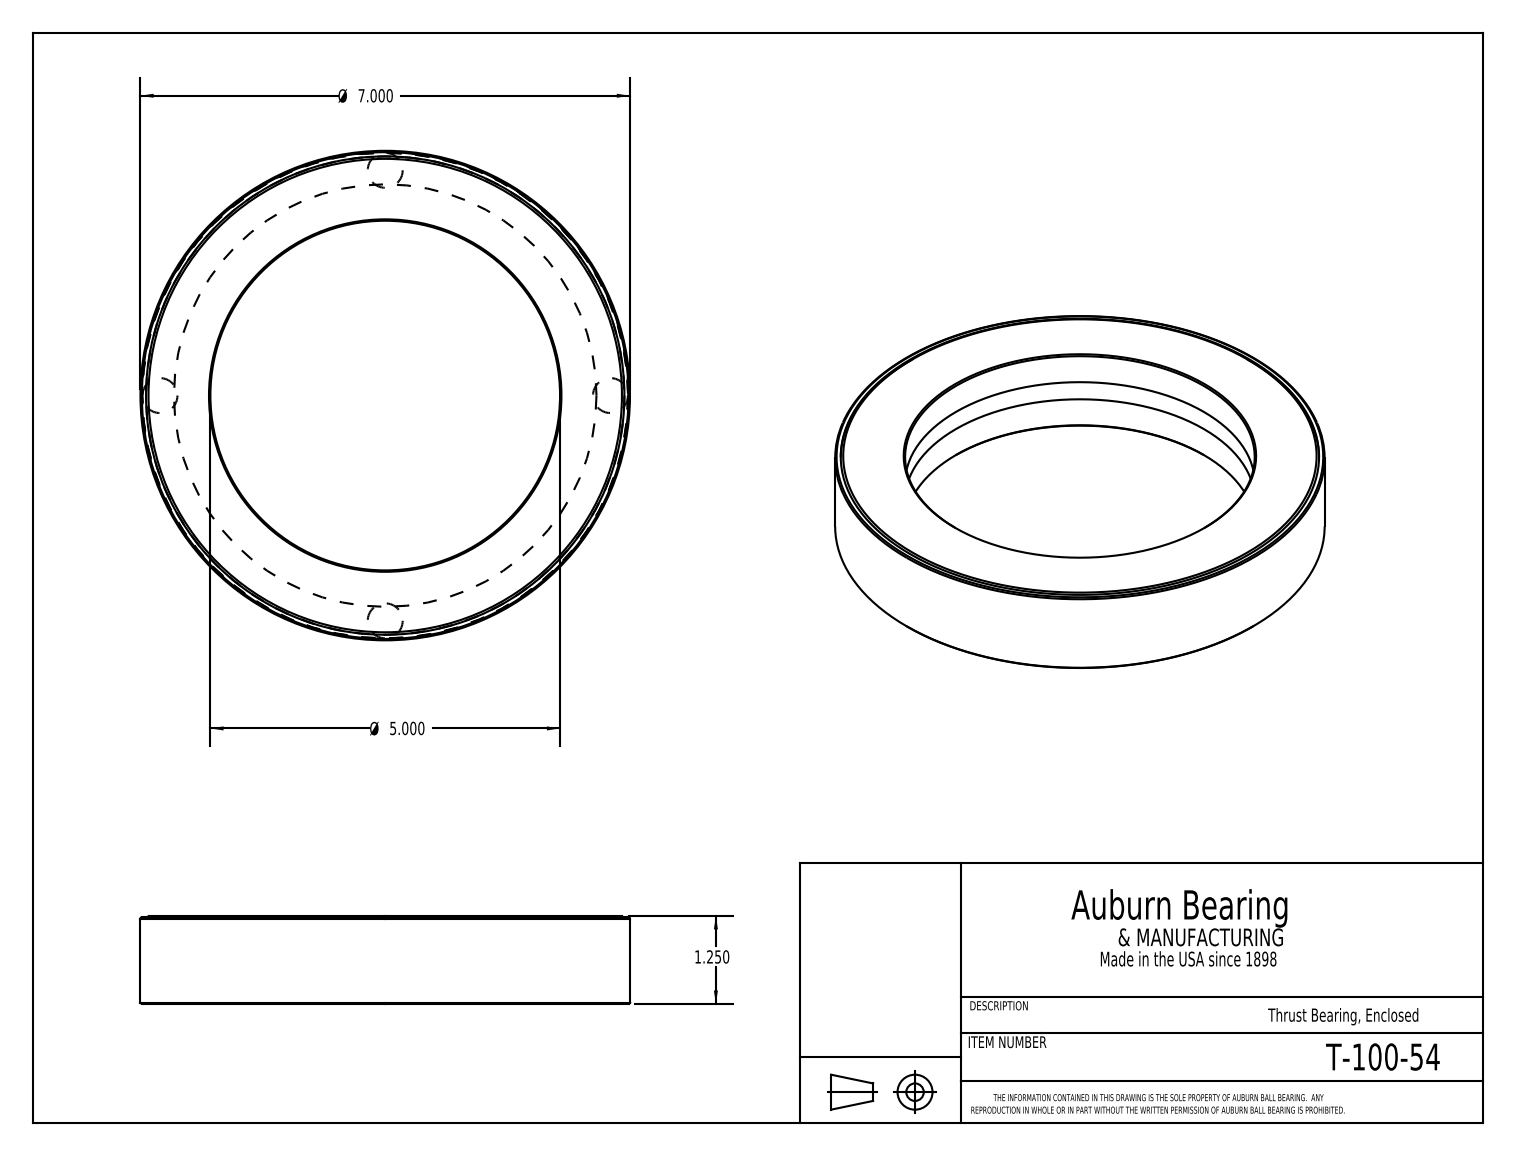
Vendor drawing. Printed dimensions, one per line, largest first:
Ø 7.000
Ø 5.000
1.250
